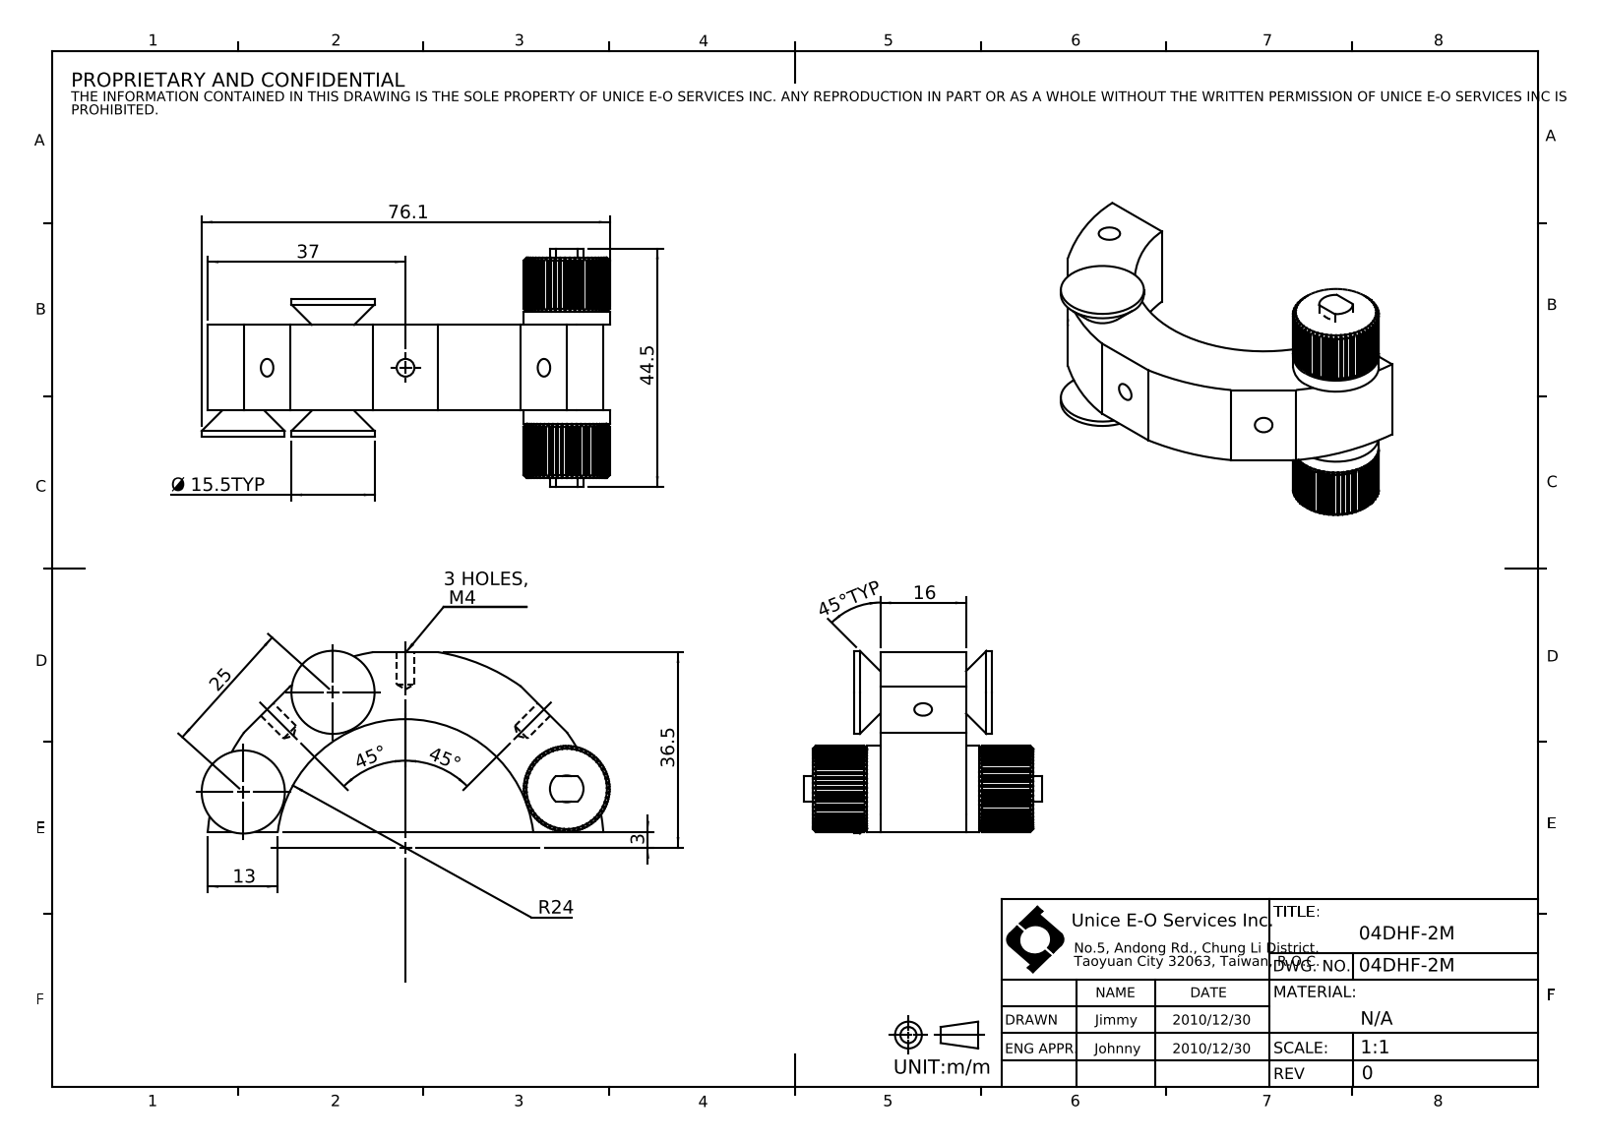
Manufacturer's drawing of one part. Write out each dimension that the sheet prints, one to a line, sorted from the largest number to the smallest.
76.1
45°
45°
45° TYP
44.5
37
36.5
25
R24
16
Ø 15.5 TYP
13
3
